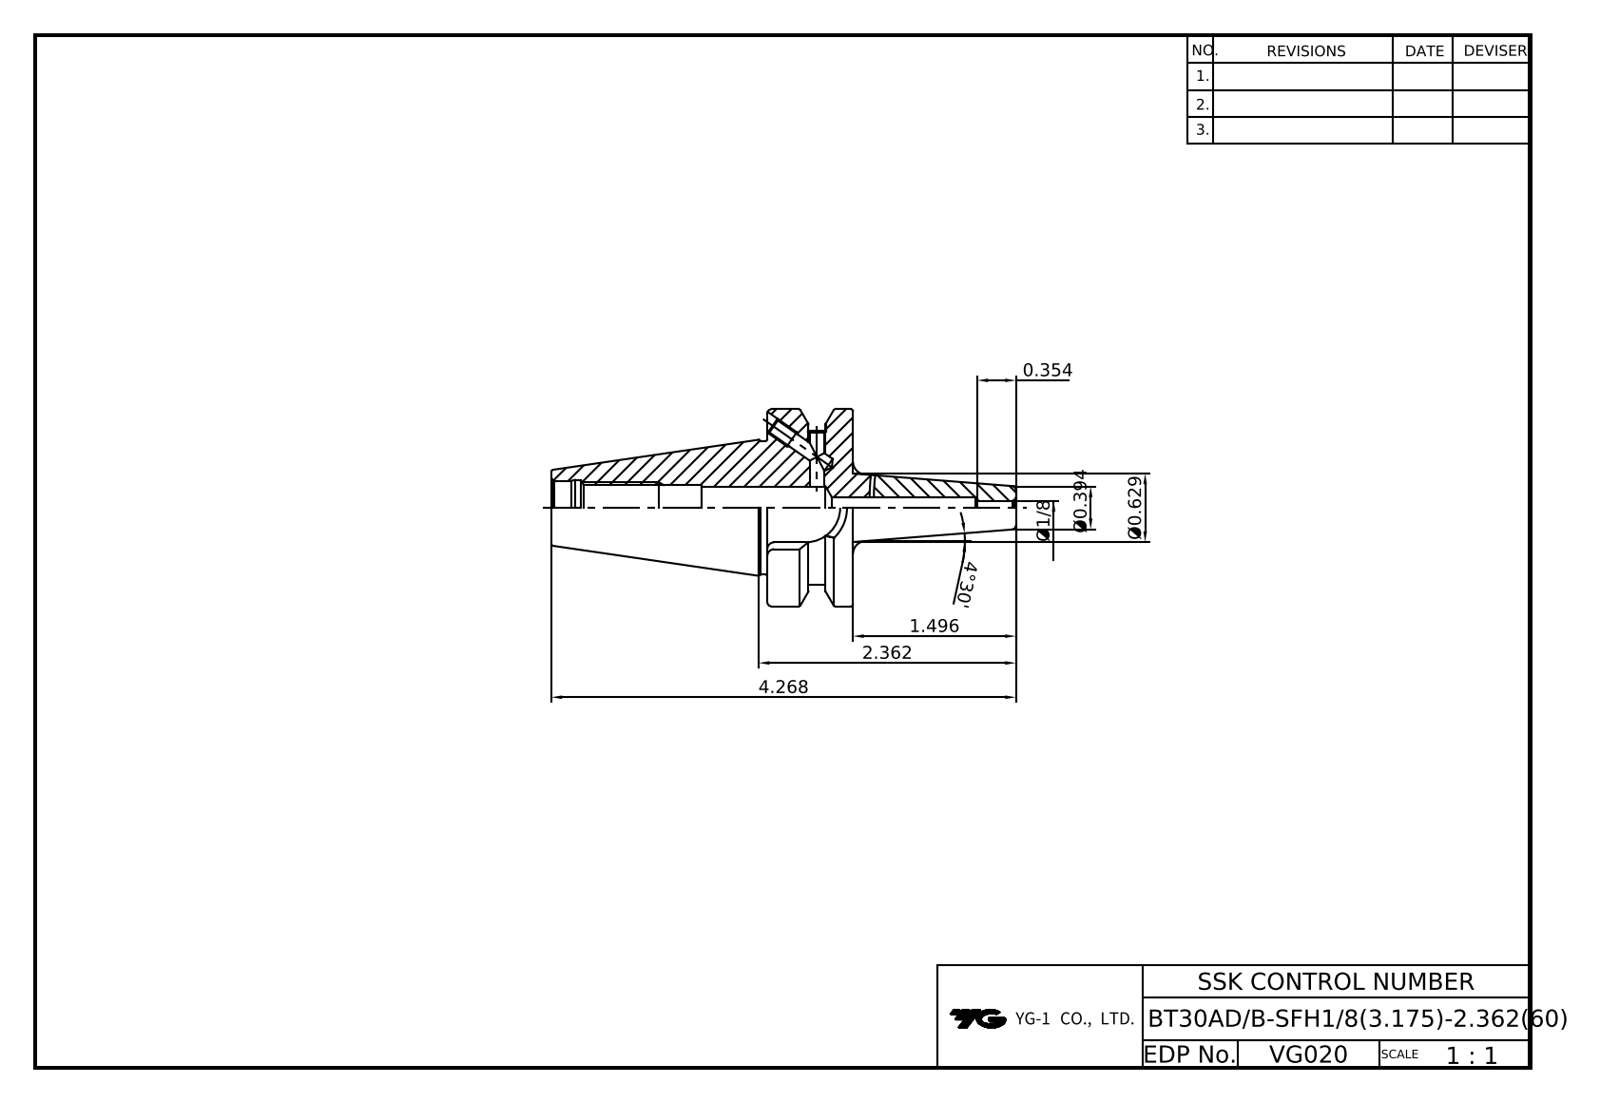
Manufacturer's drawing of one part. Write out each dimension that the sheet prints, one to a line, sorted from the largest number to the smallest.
4.268
4°30'
2.362
1.496
Ø0.629
Ø0.394
0.354
